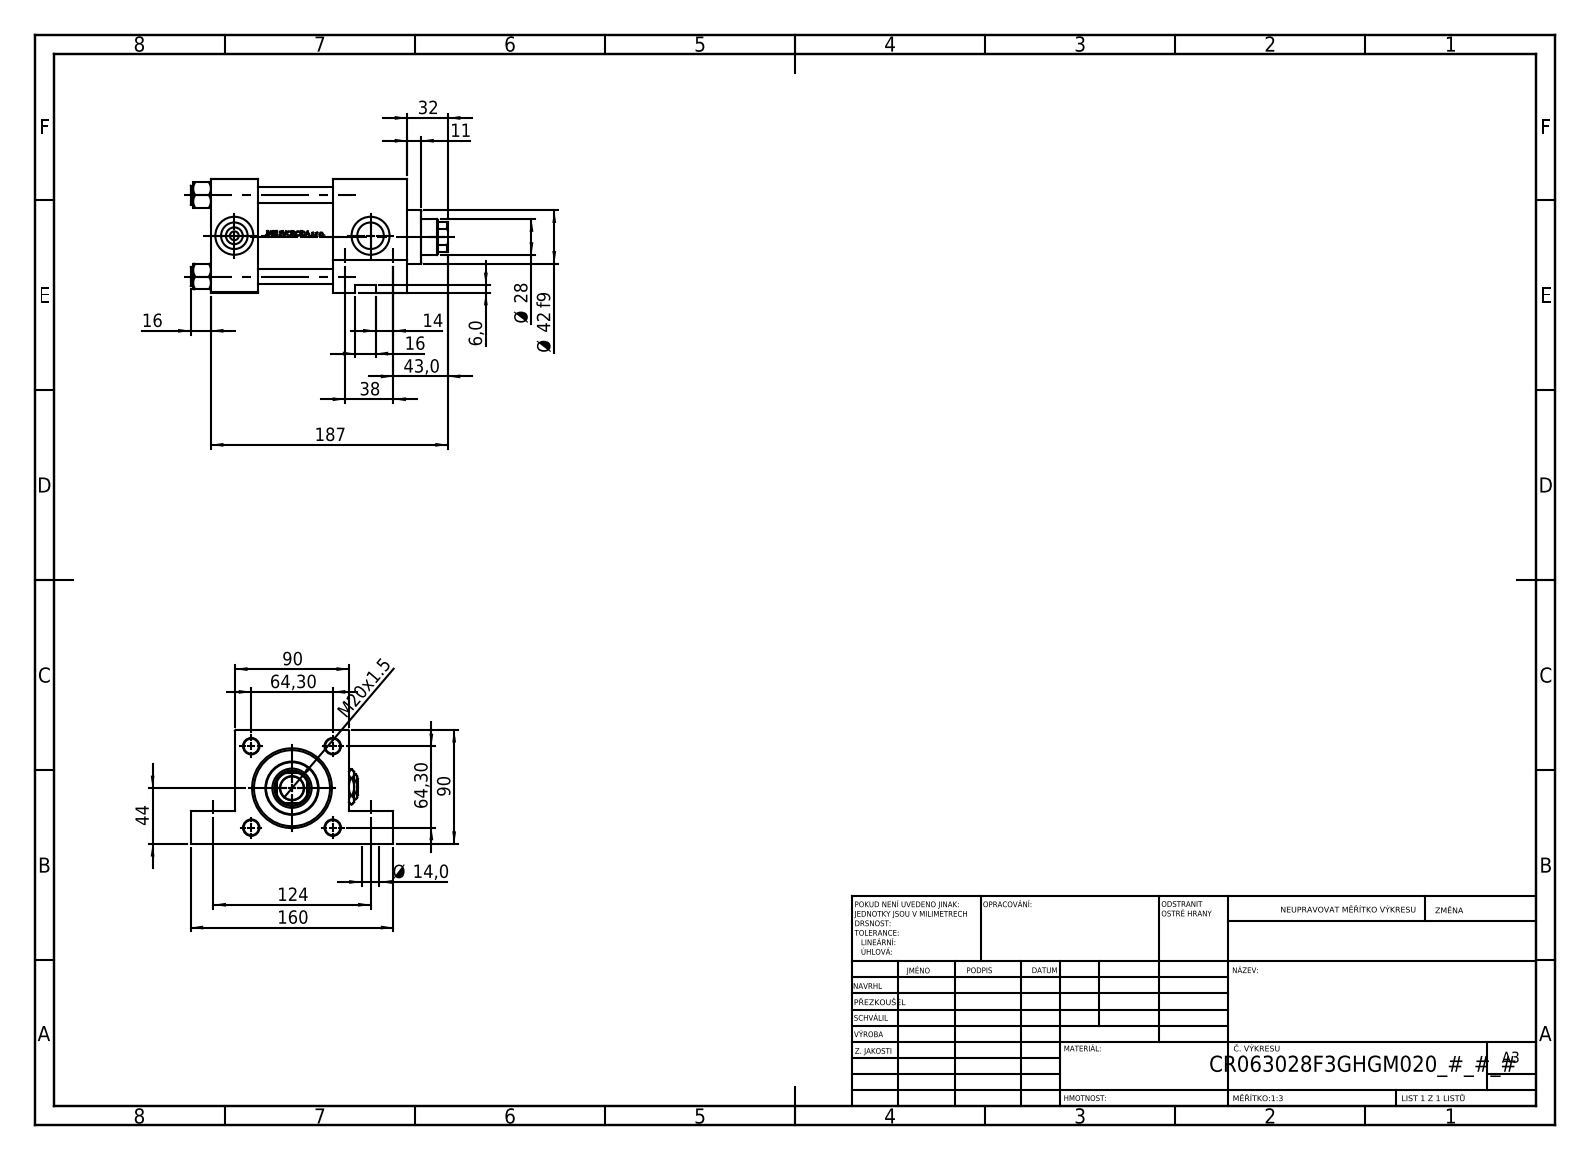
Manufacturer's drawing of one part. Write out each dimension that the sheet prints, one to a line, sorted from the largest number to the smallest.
187
160
124
90
90
64,30
64,30
44
43,0
Ø 42 f9
38
32
Ø 28
M20x1.5
16
16
14
Ø 14,0
11
6,0
